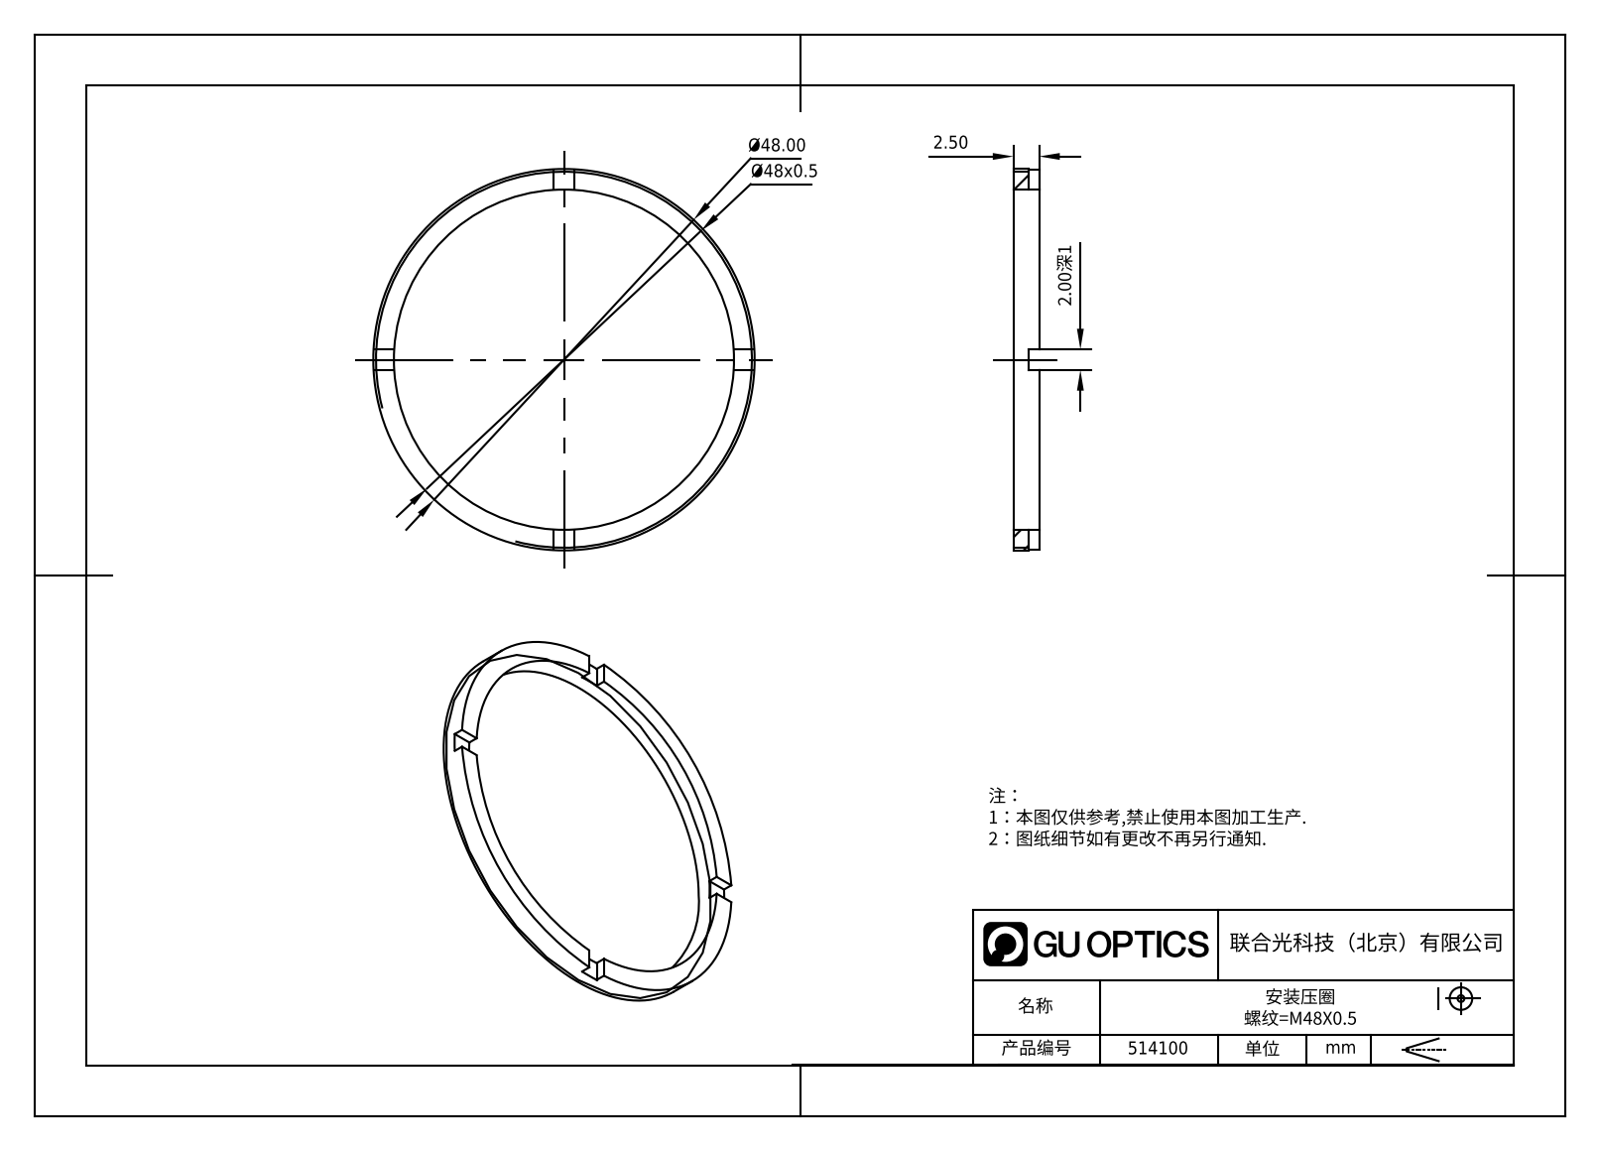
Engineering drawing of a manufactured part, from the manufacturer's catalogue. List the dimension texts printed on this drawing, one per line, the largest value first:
Ø48.00
Ø48x0.5
2.50
2.00深1
